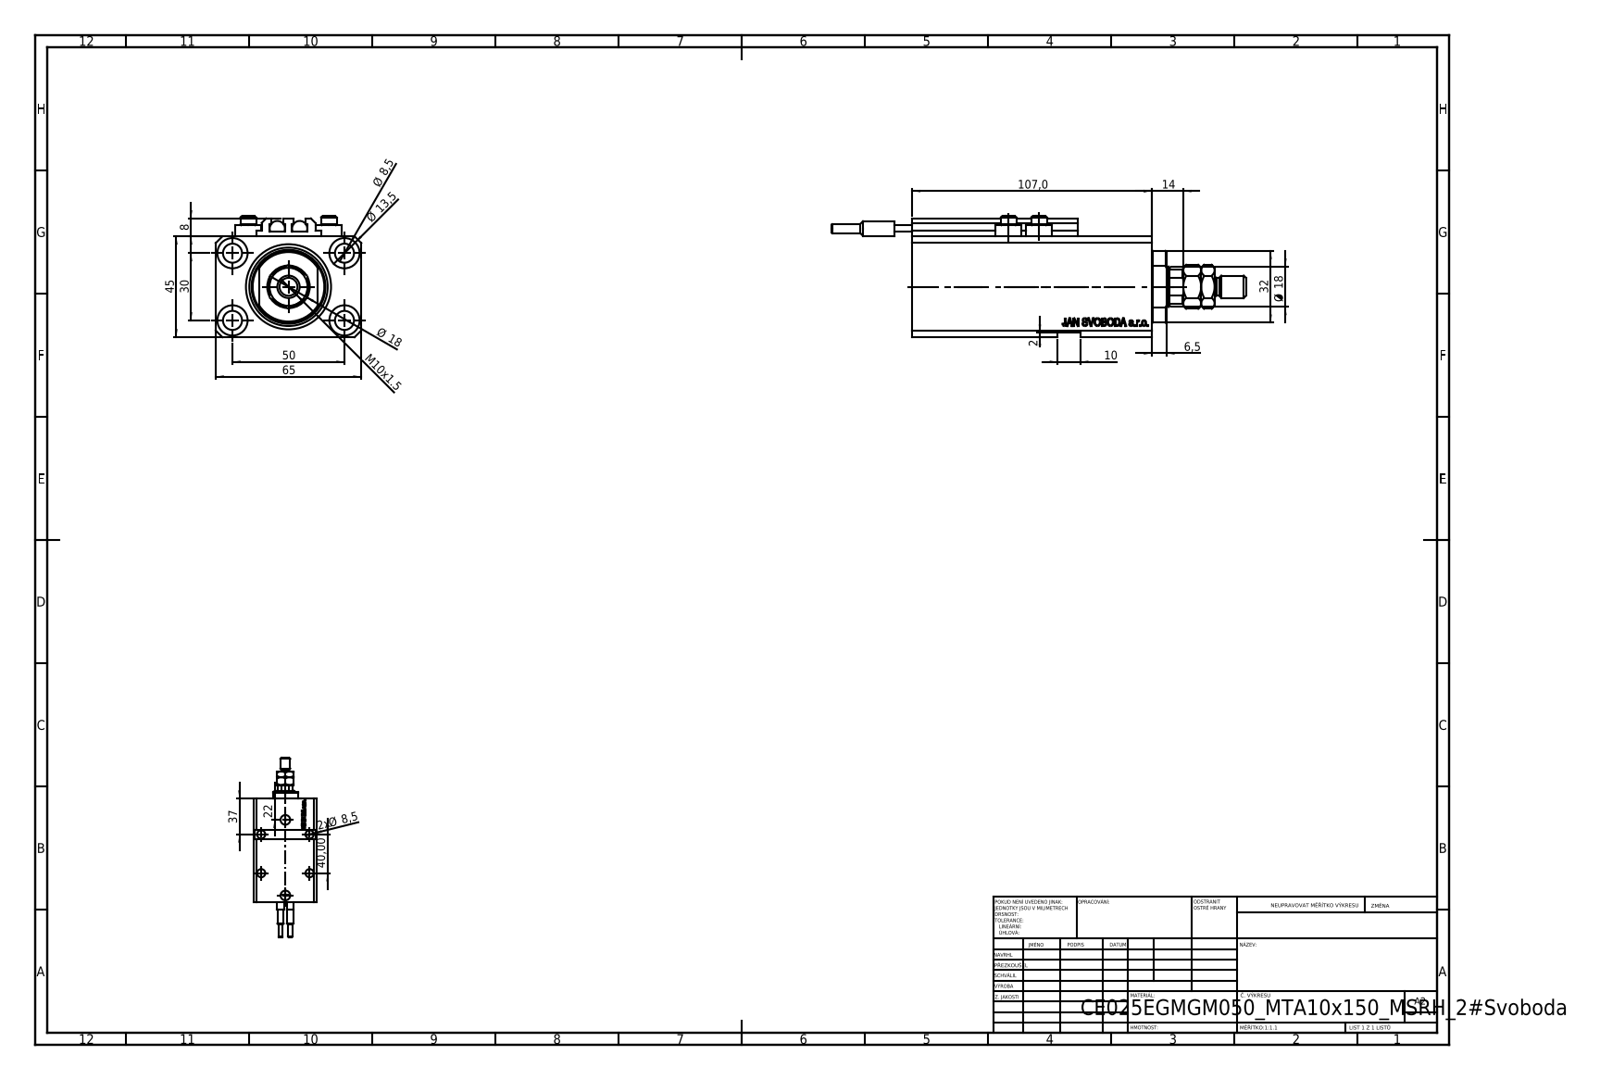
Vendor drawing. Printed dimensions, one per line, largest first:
107,0
65
50
45
40,00
37
32
30
22
Ø 18
Ø 18
14
Ø 13,5
M10x1.5
10
Ø 8,5
2x Ø 8,5
8
6,5
2
